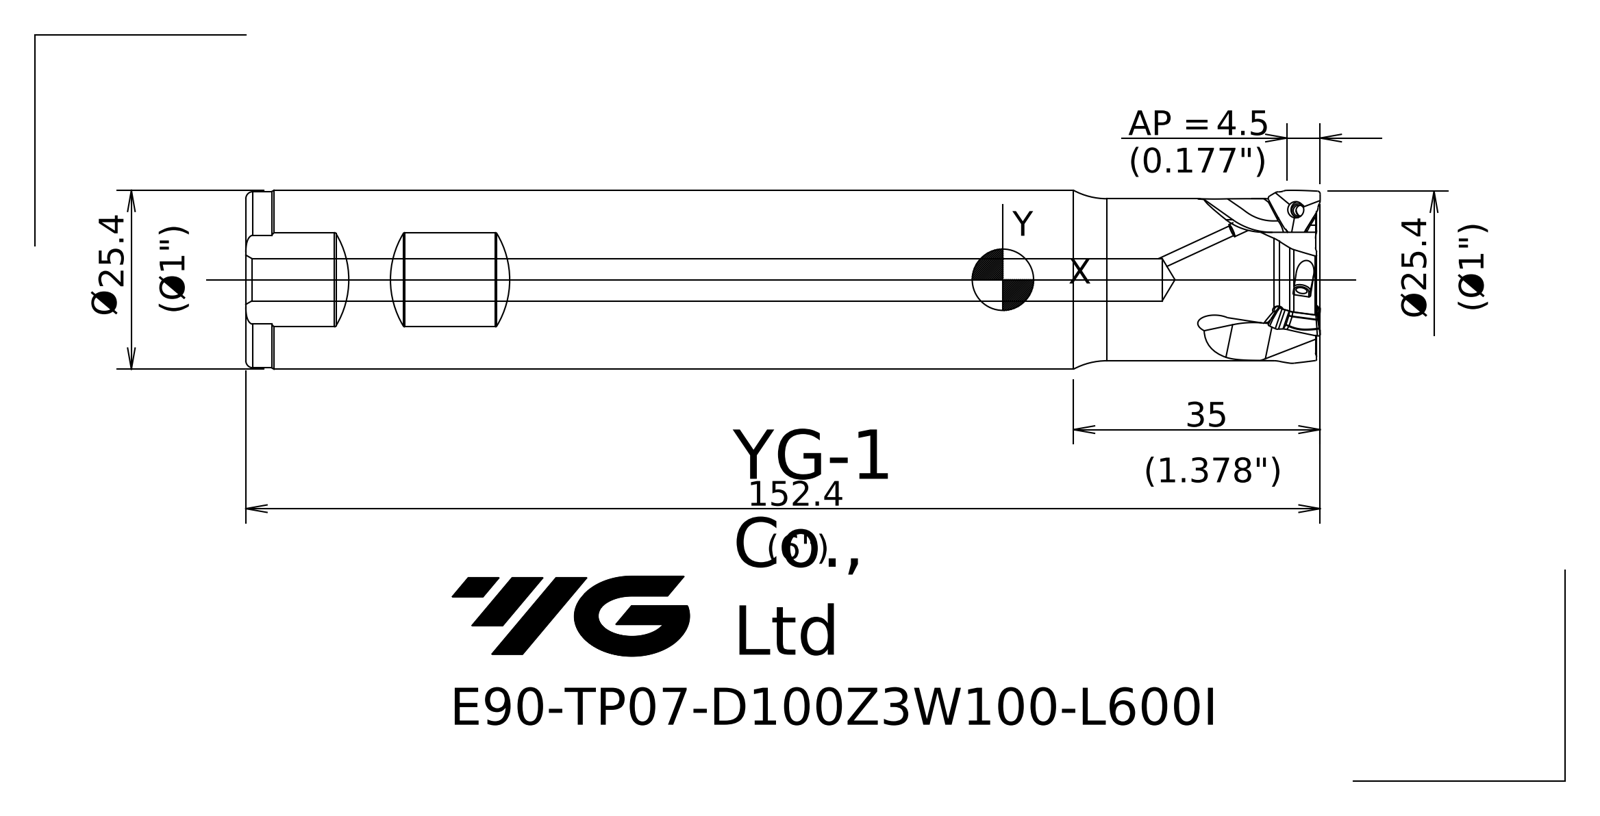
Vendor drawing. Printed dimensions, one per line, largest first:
152.4
35
Ø25.4
4.5 AP =
